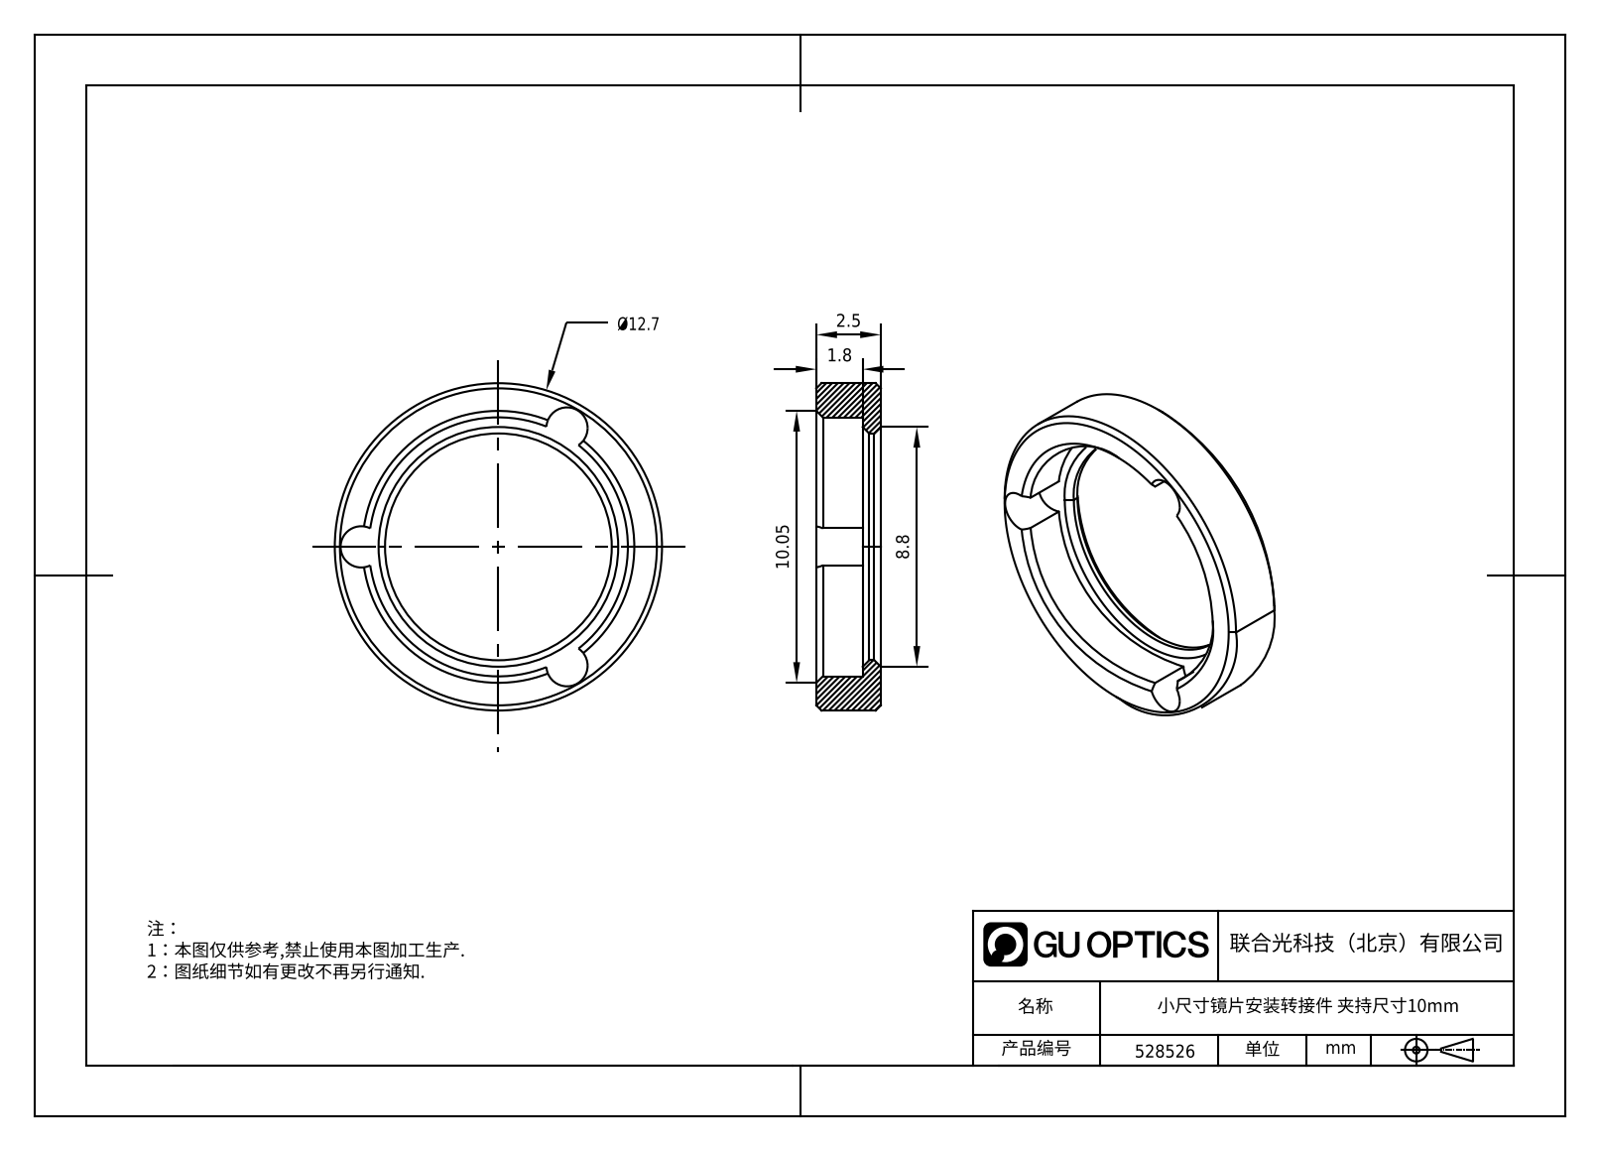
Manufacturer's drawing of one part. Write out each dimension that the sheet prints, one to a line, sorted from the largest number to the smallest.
10.05
8.8
2.5
1.8
